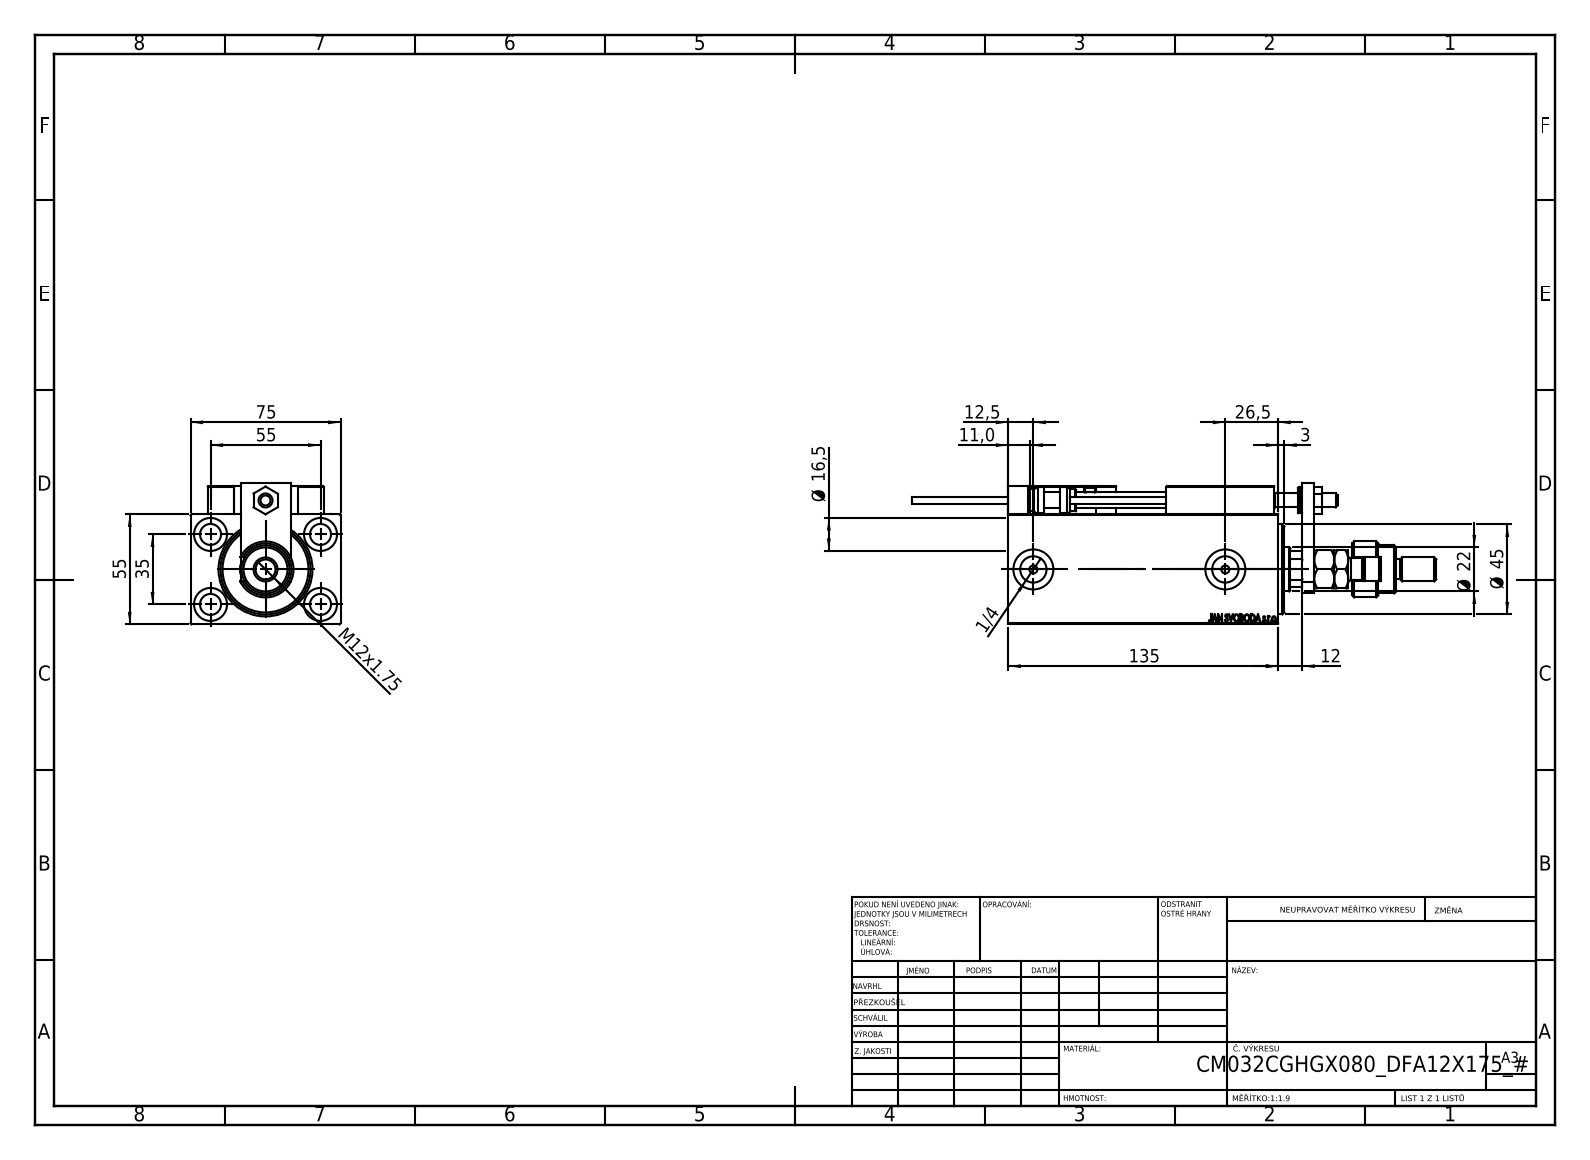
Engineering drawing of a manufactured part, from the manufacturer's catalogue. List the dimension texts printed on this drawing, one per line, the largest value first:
135
75
55
55
Ø 45
35
26,5
Ø 22
Ø 16,5
12,5
M12x1.75
12
11,0
3
1/4
